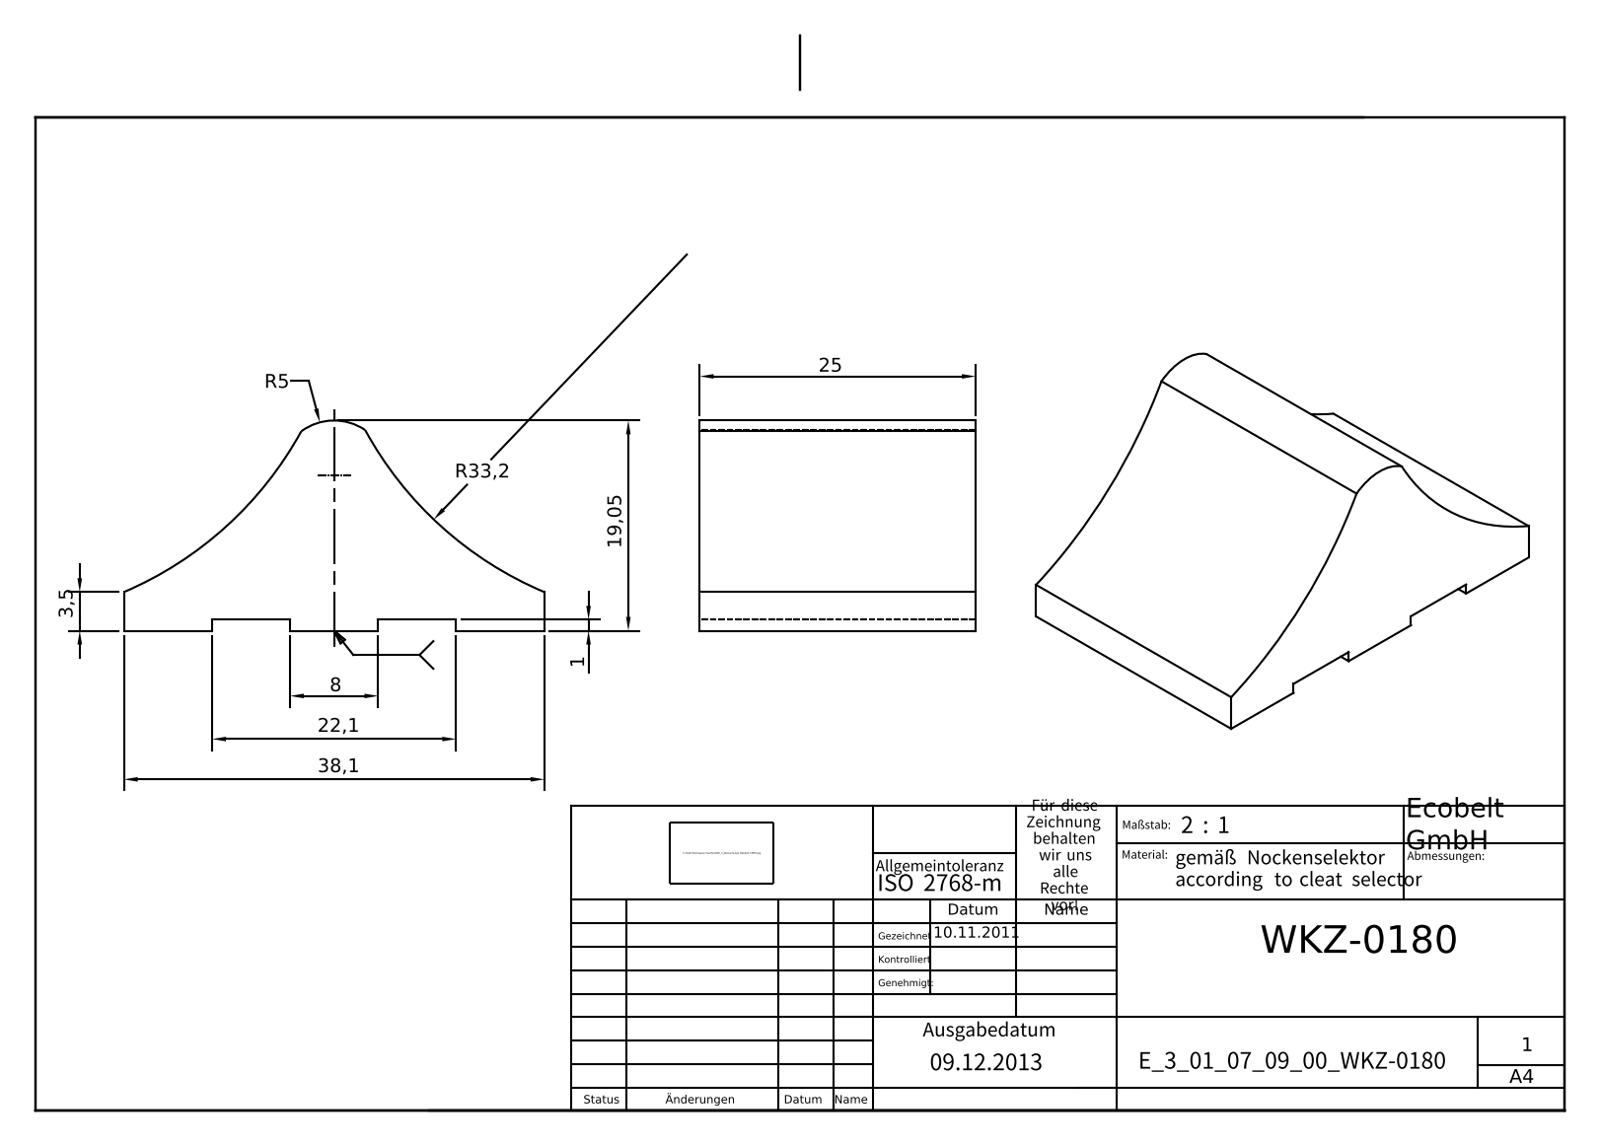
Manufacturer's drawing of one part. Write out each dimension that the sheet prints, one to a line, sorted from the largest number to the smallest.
38,1
R33,2
25
22,1
19,05
8
R5
3,5
1
